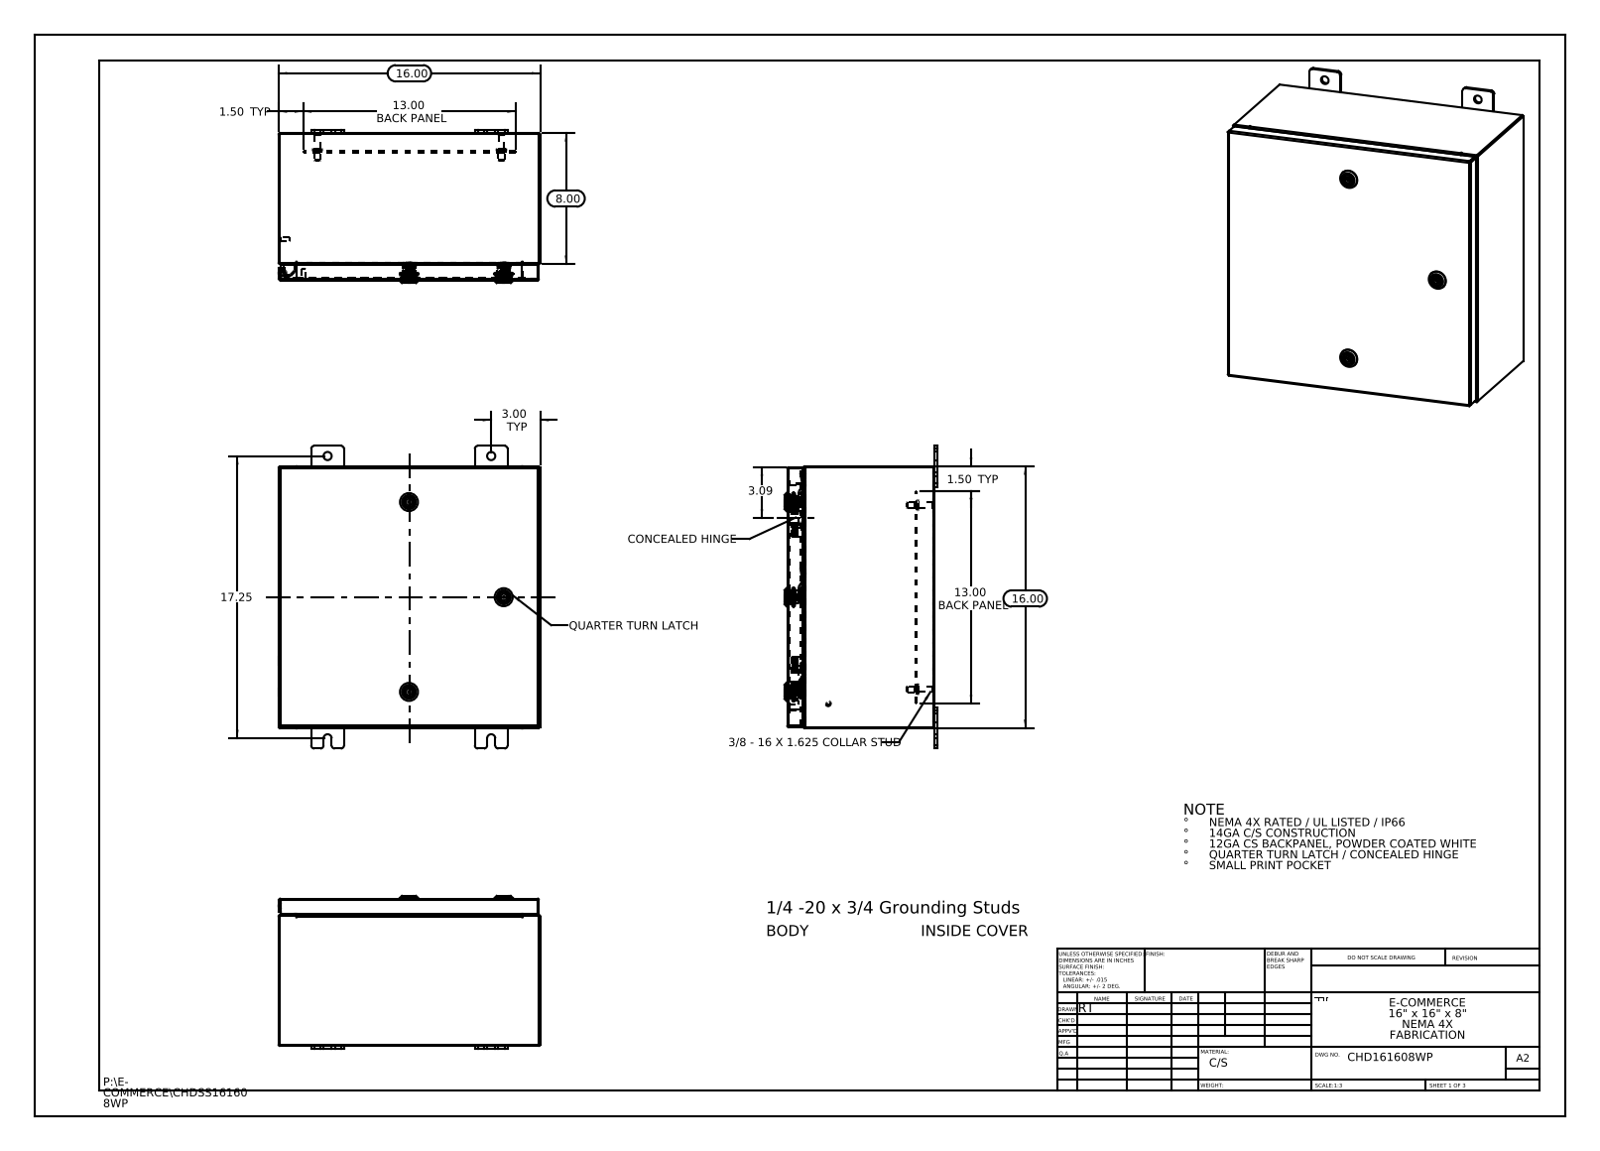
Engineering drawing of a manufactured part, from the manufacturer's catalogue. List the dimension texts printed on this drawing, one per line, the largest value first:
17.25
16.00
16.00
13.00 BACK PANEL
13.00 BACK PANEL
8.00
3.09
3.00 TYP
1.50 TYP
1.50 TYP
